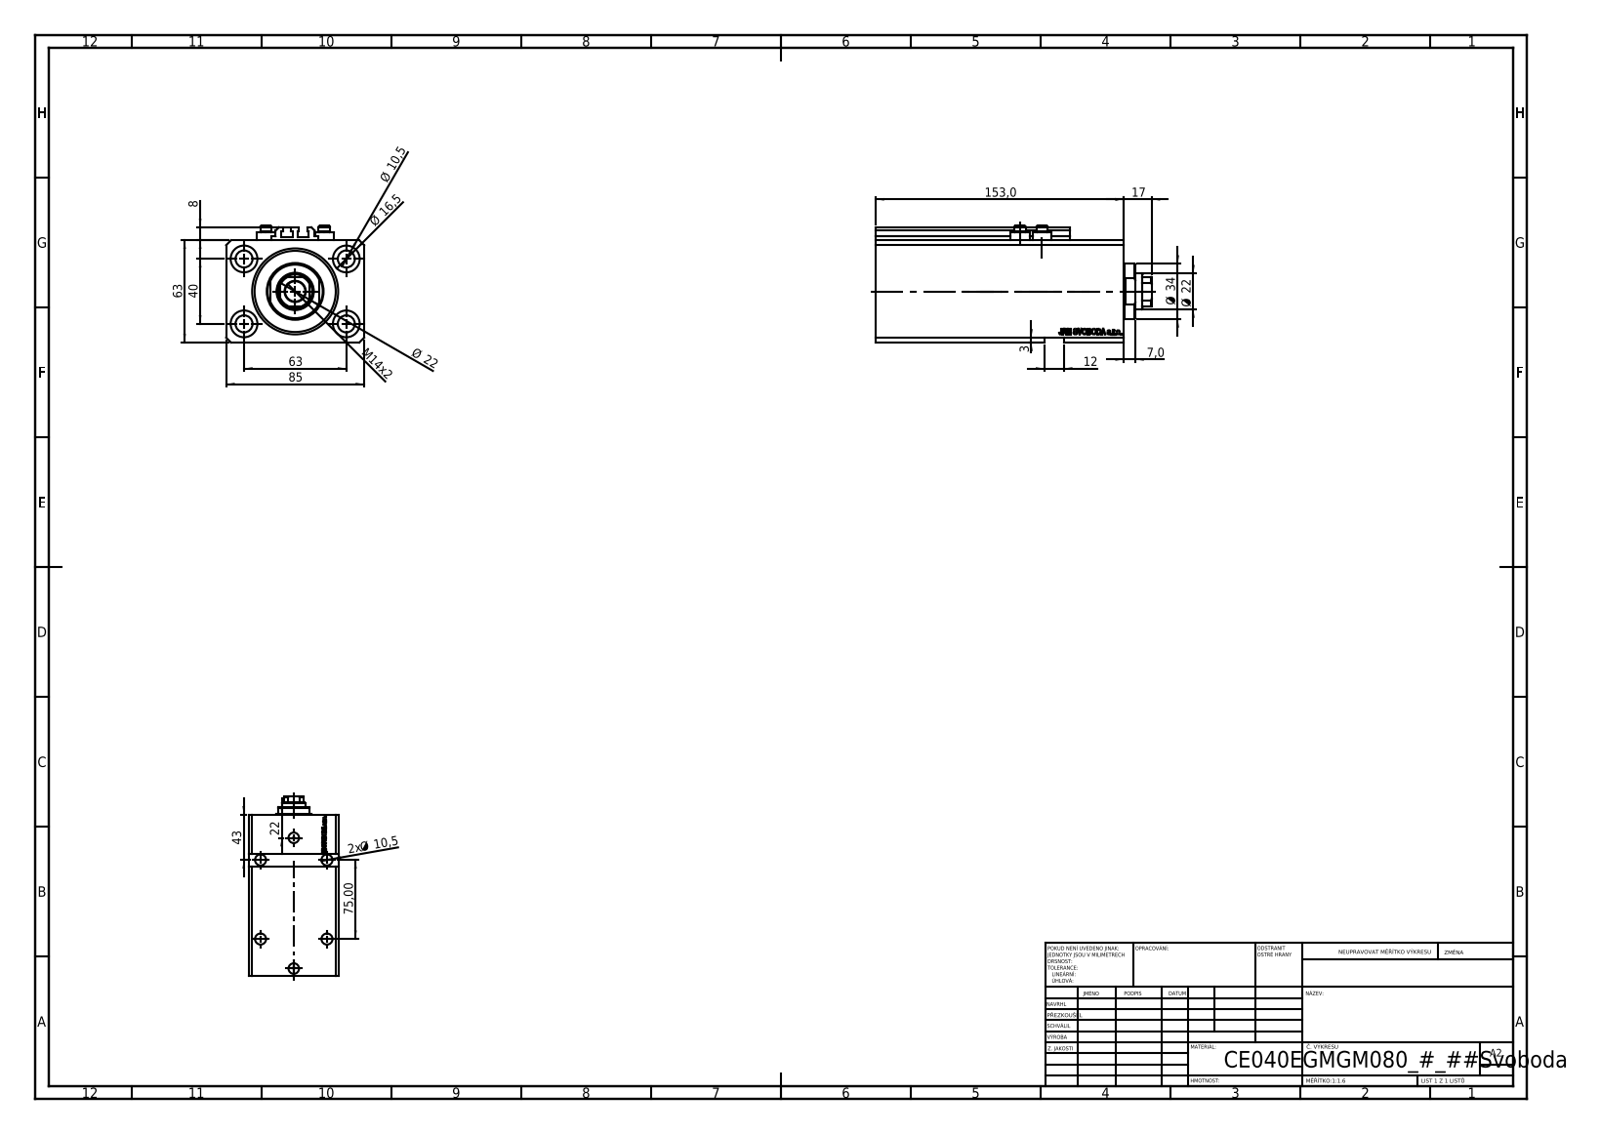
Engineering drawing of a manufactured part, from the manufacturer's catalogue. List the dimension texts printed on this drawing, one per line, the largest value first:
153,0
85
75,00
63
63
43
40
Ø 34
Ø 22
Ø 22
22
17
Ø 16,5
M14x2
12
Ø 10,5
2x Ø 10,5
8
7,0
3
